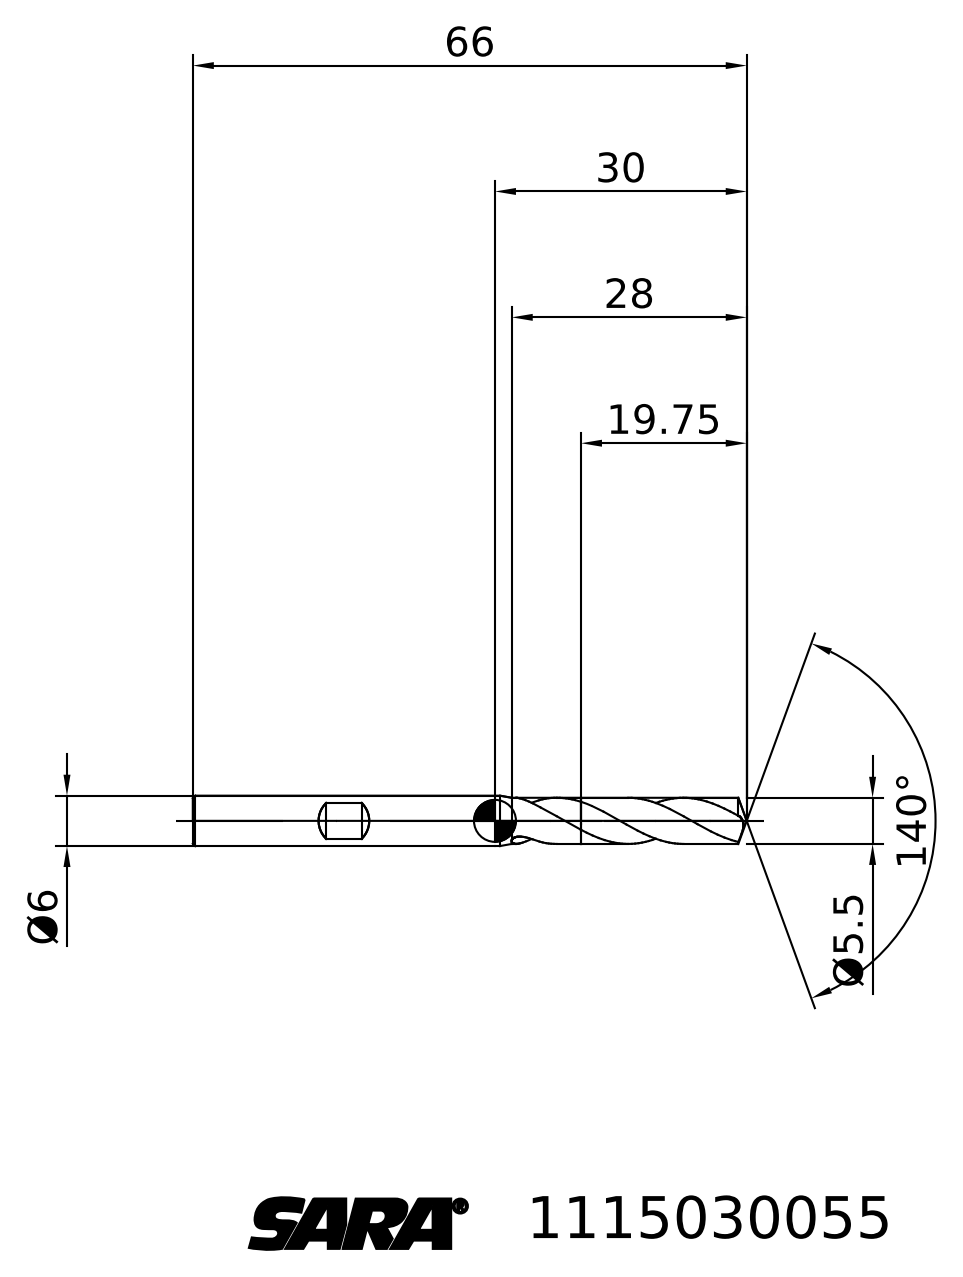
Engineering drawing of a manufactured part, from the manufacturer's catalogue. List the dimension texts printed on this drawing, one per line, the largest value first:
140°
66
30
28
19.75
Ø6
Ø5.5
